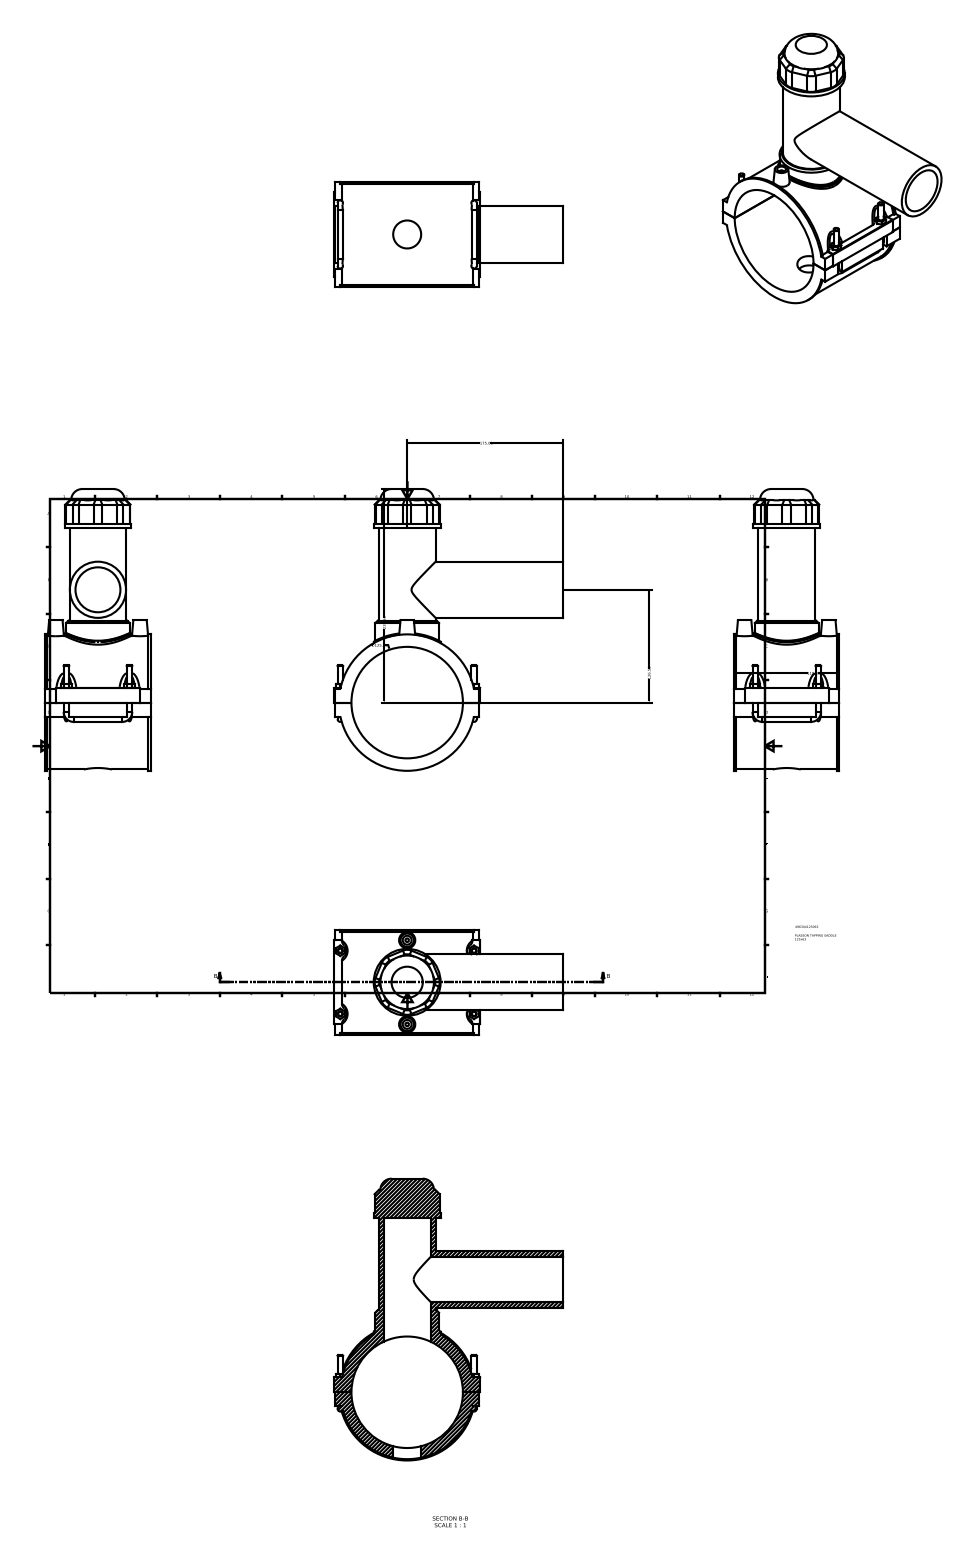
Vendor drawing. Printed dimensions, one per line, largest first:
239.50
175.00
126.50
∅125.00
118.00
